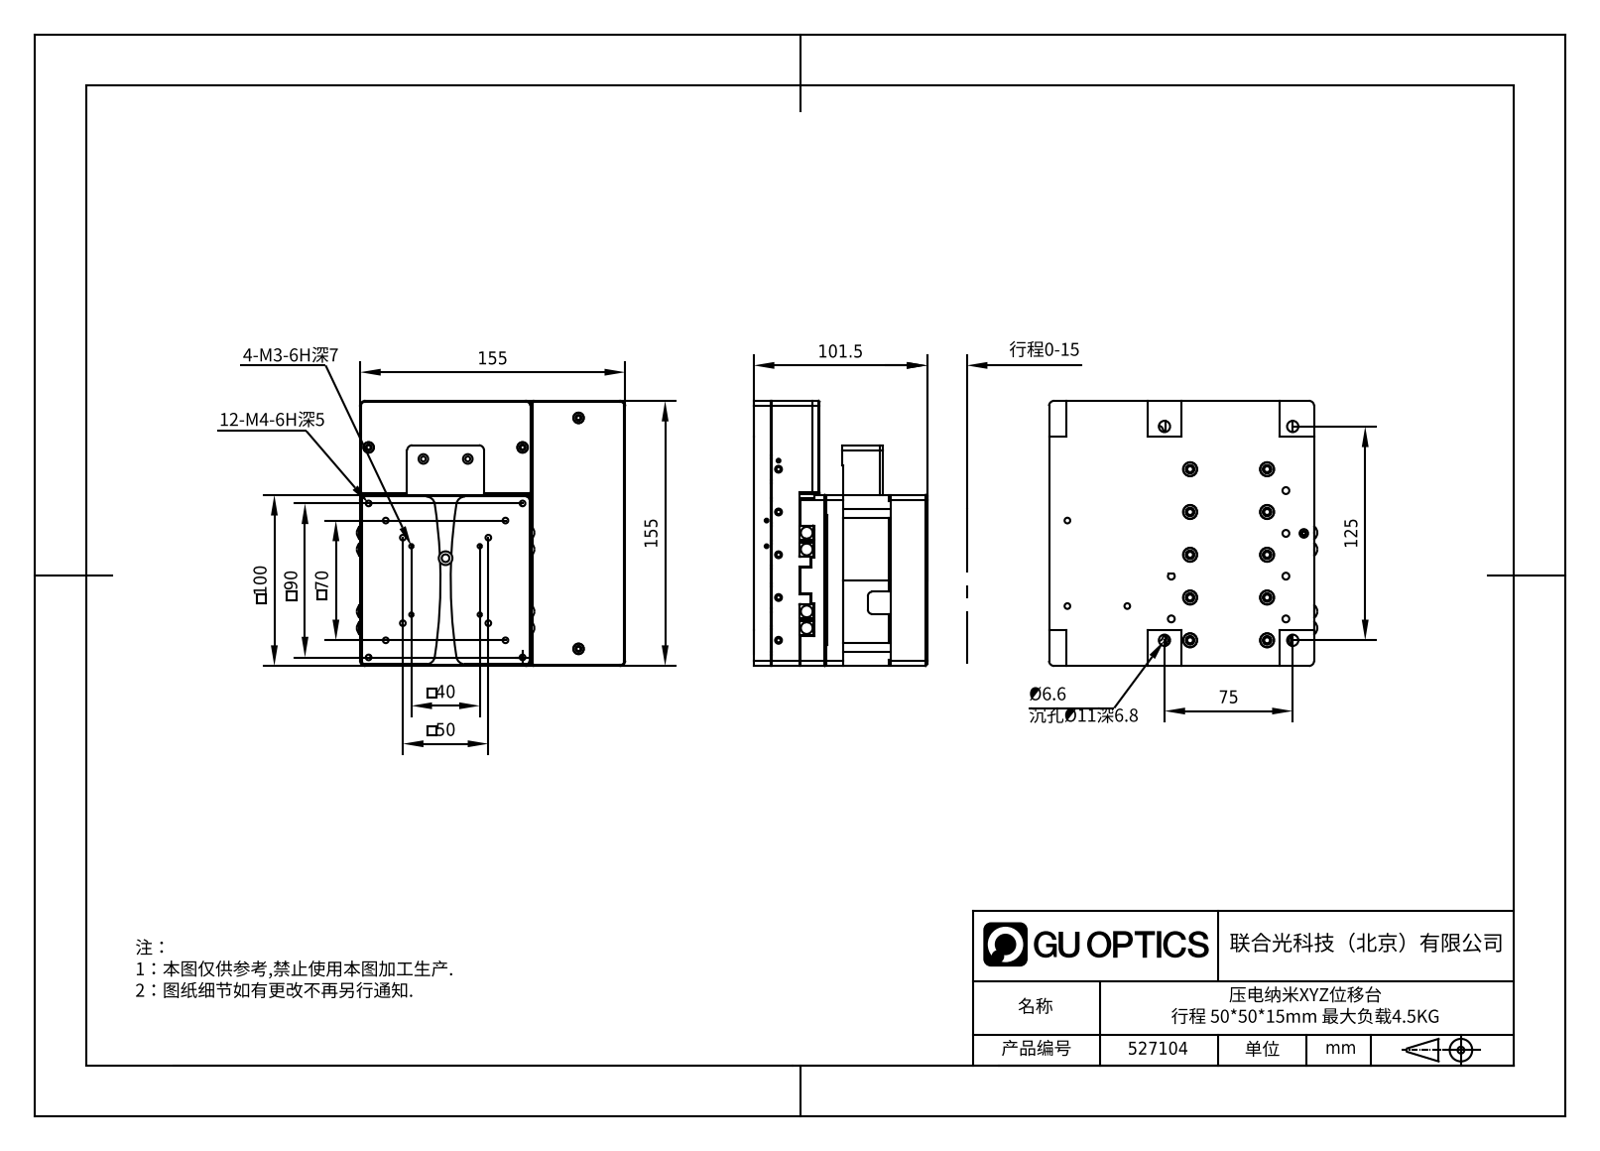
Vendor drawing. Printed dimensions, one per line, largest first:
155
155
125
101.5
100
90
75
70
50
40
行程0-15
